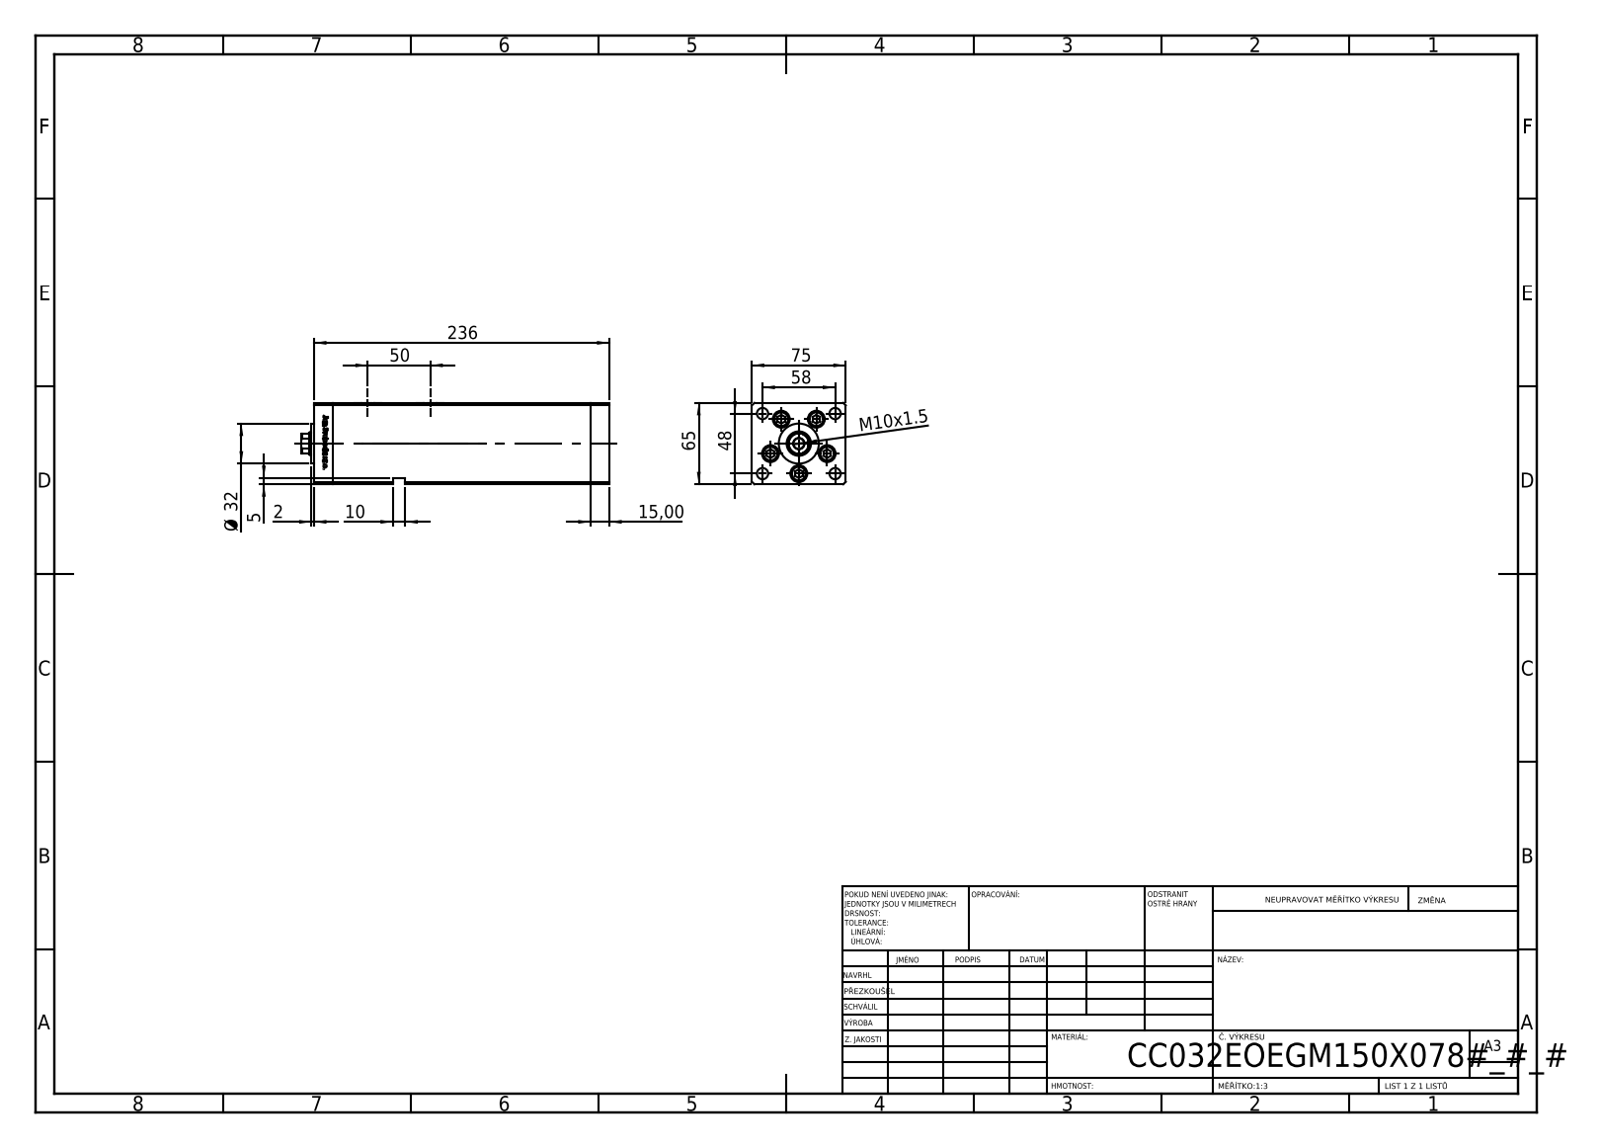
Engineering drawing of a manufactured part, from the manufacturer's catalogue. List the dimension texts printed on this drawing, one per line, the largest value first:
236
75
65
58
50
48
Ø 32
15,00
10
M10x1.5
5
2
